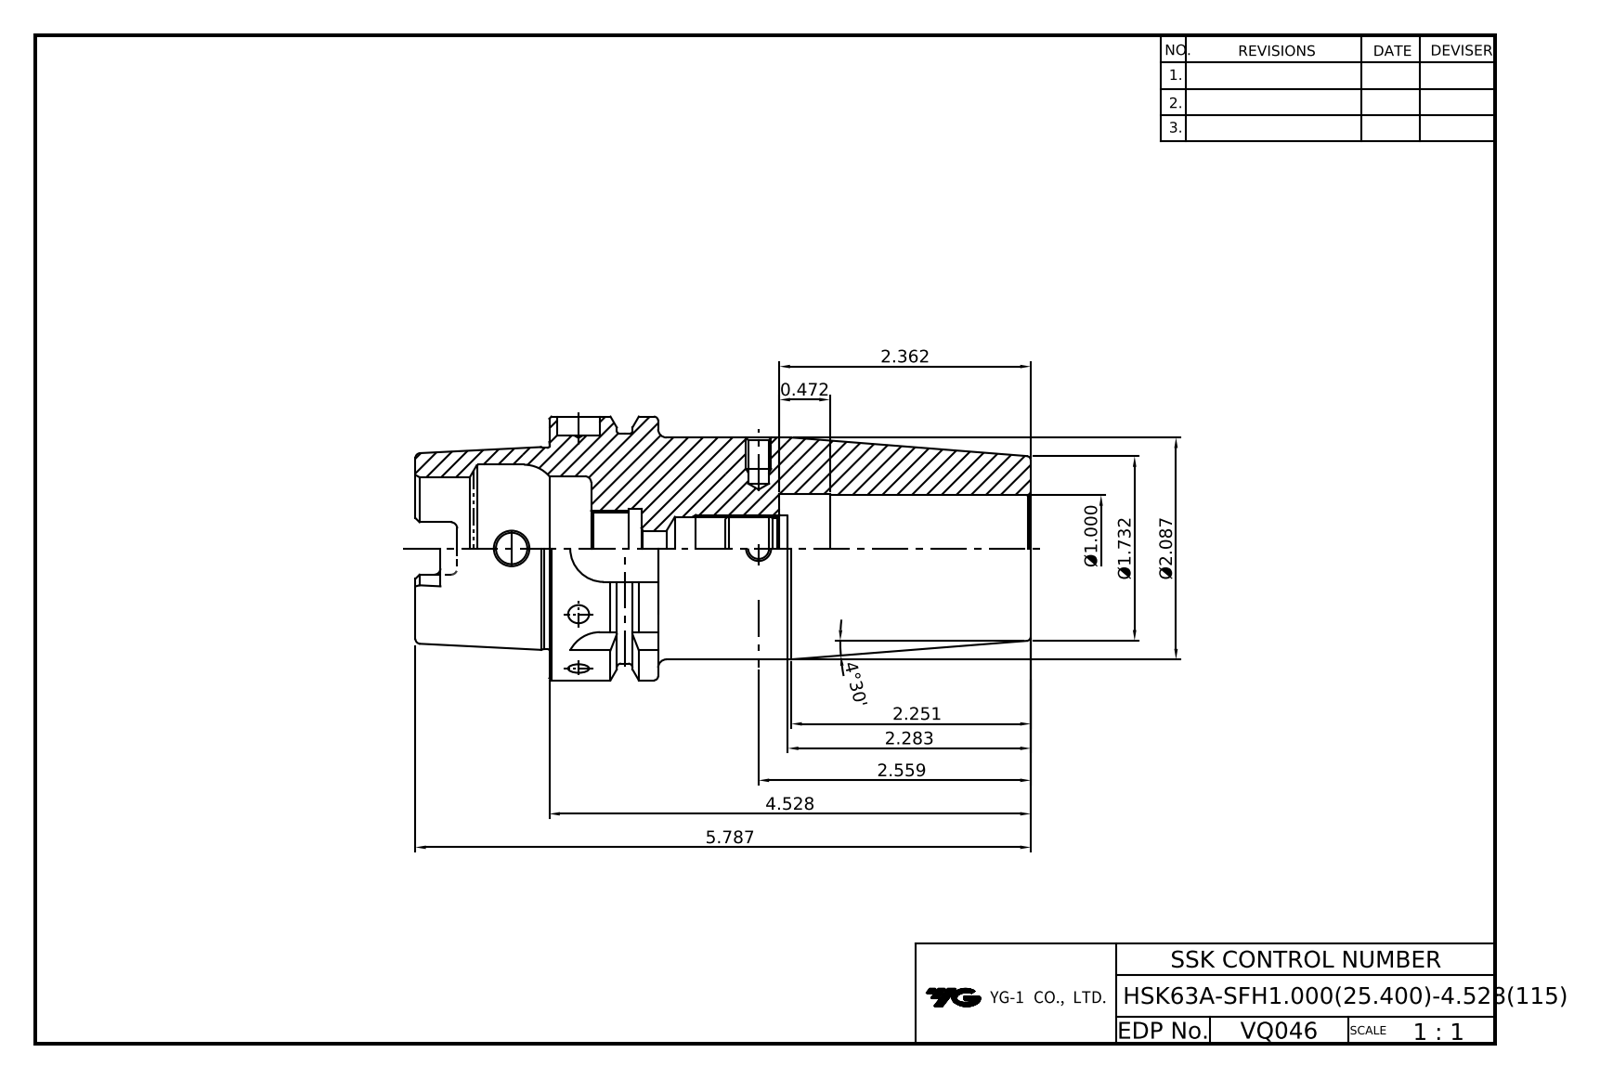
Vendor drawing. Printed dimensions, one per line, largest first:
5.787
4.528
4°30'
2.559
2.362
2.283
2.251
Ø2.087
Ø1.732
0.472
